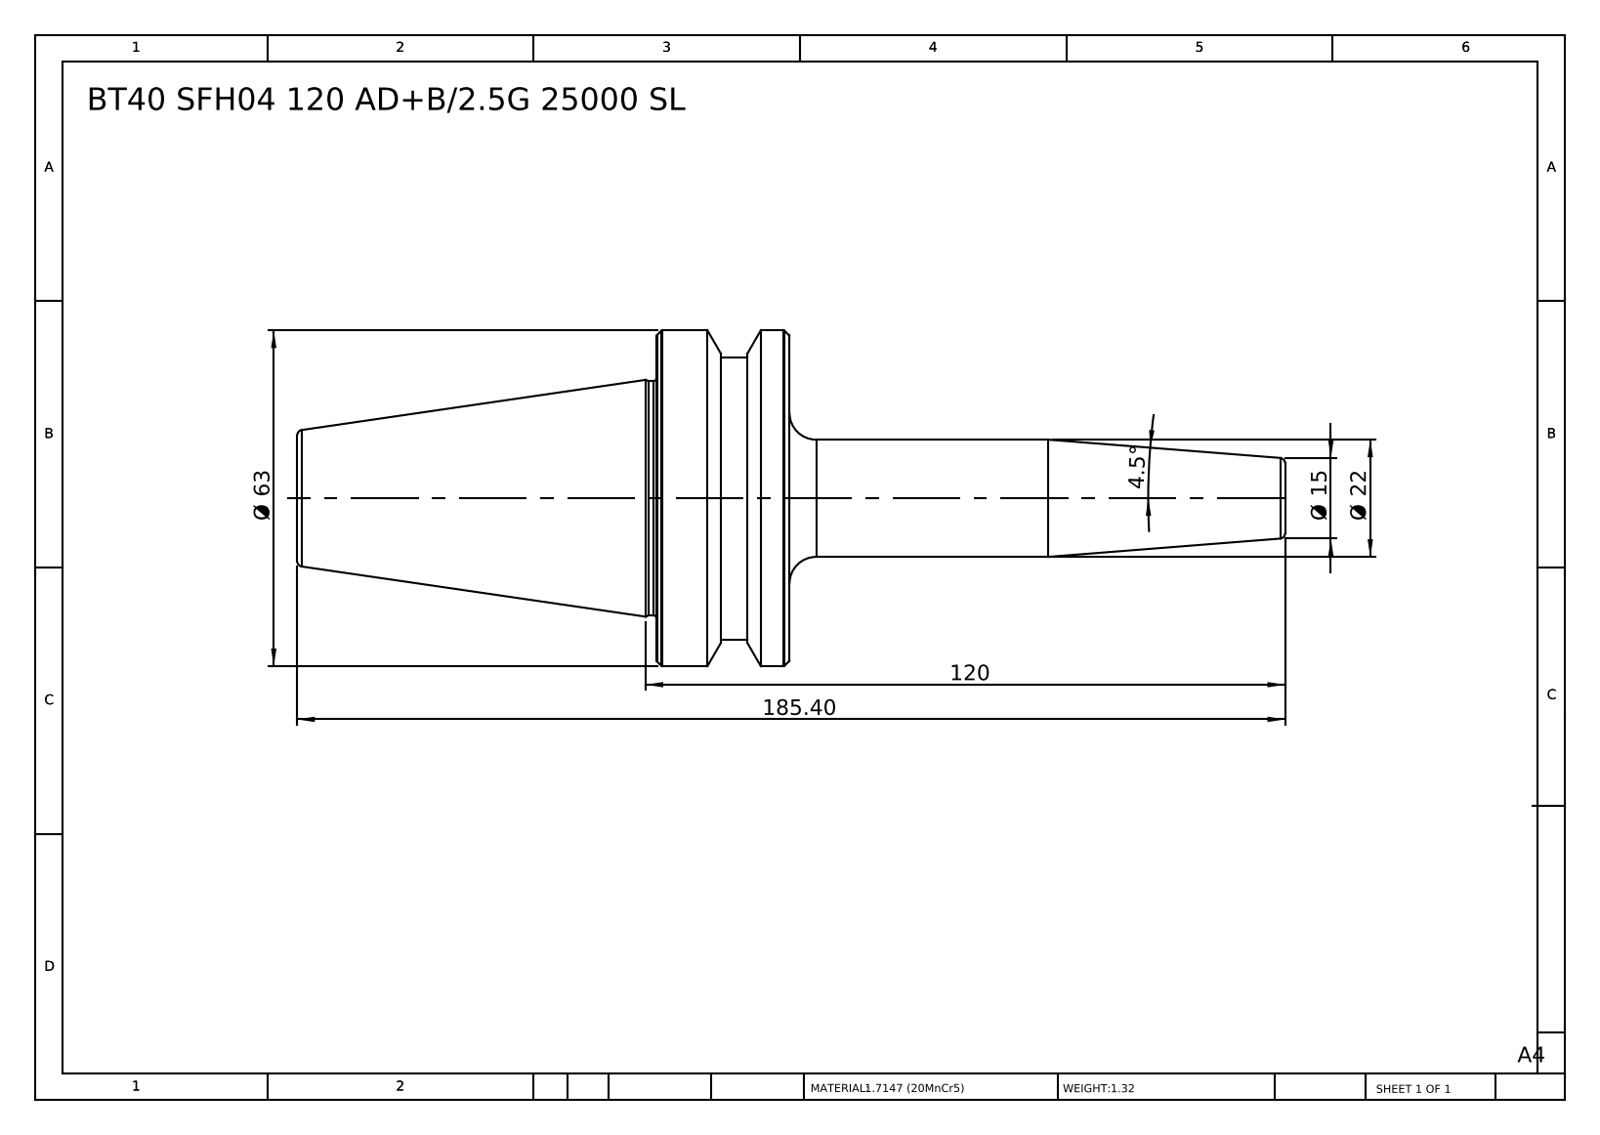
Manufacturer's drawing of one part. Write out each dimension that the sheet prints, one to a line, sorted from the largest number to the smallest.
185.40
120
Ø 63
Ø 22
Ø 15
4.5°
